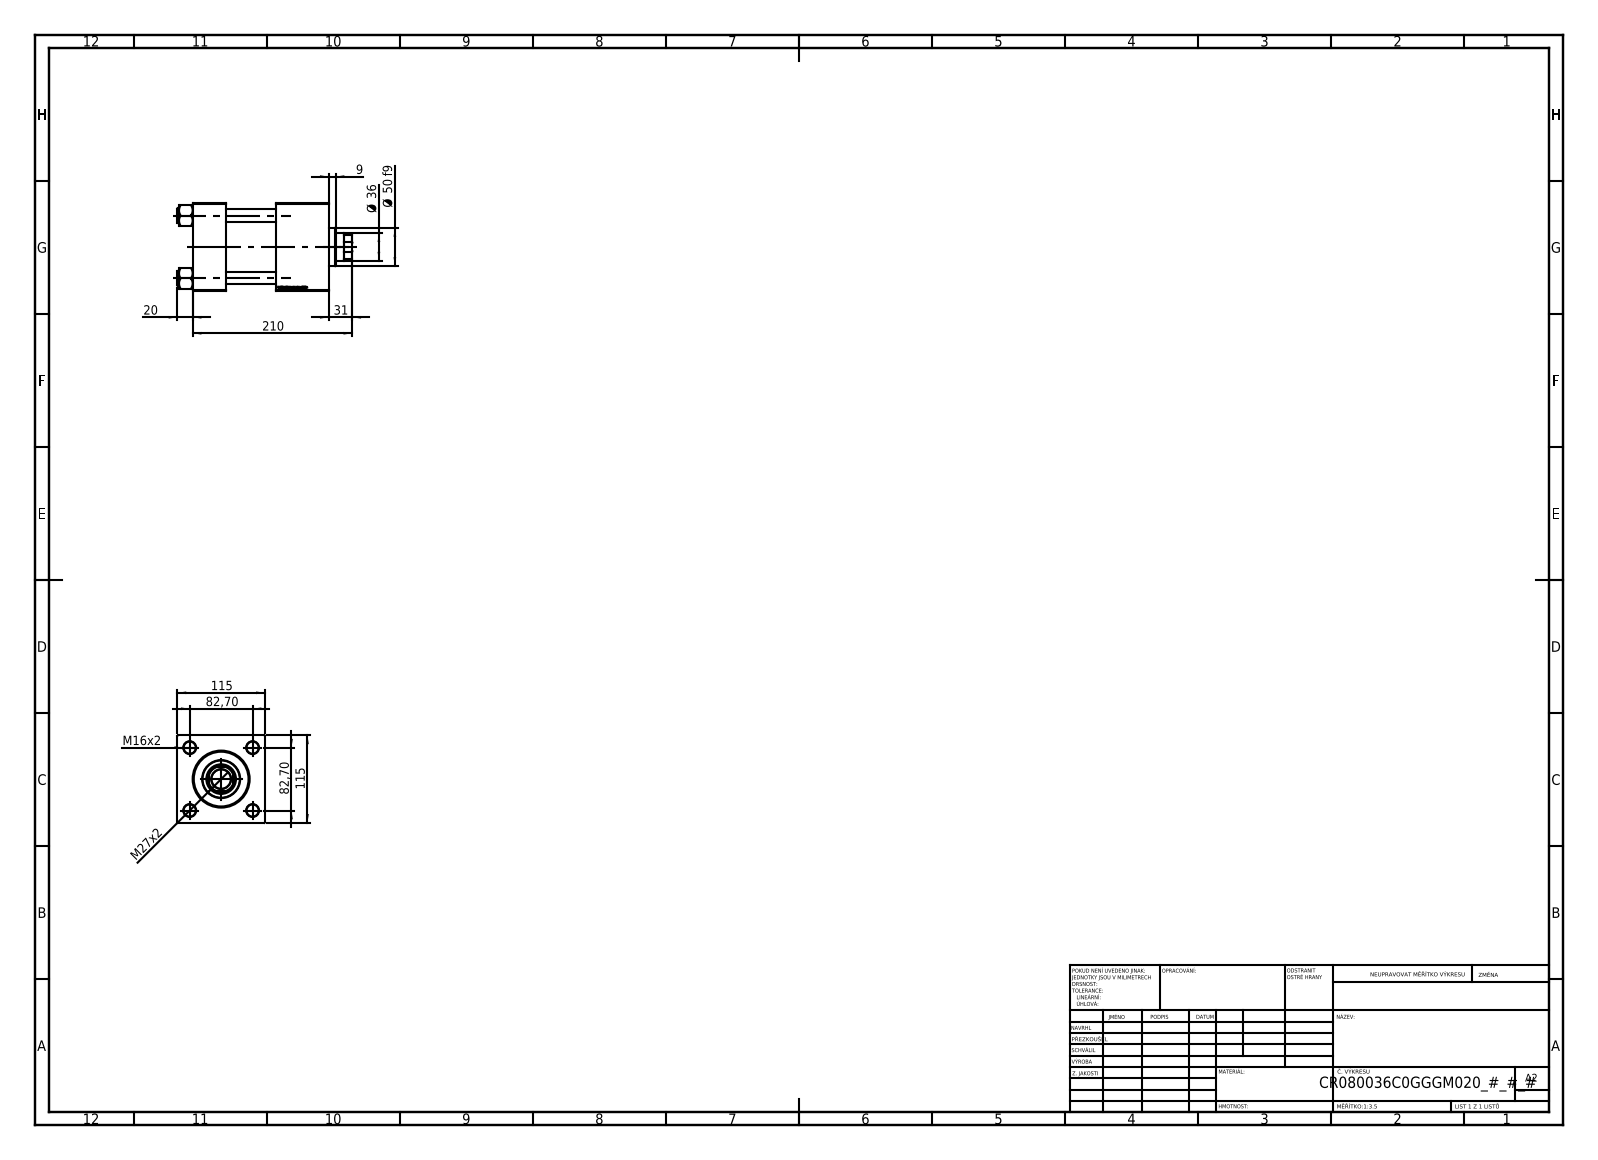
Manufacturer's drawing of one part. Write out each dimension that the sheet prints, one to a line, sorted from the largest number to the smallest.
210
115
115
82,70
82,70
Ø 50 f9
Ø 36
31
M27x2
20
M16x2
9
